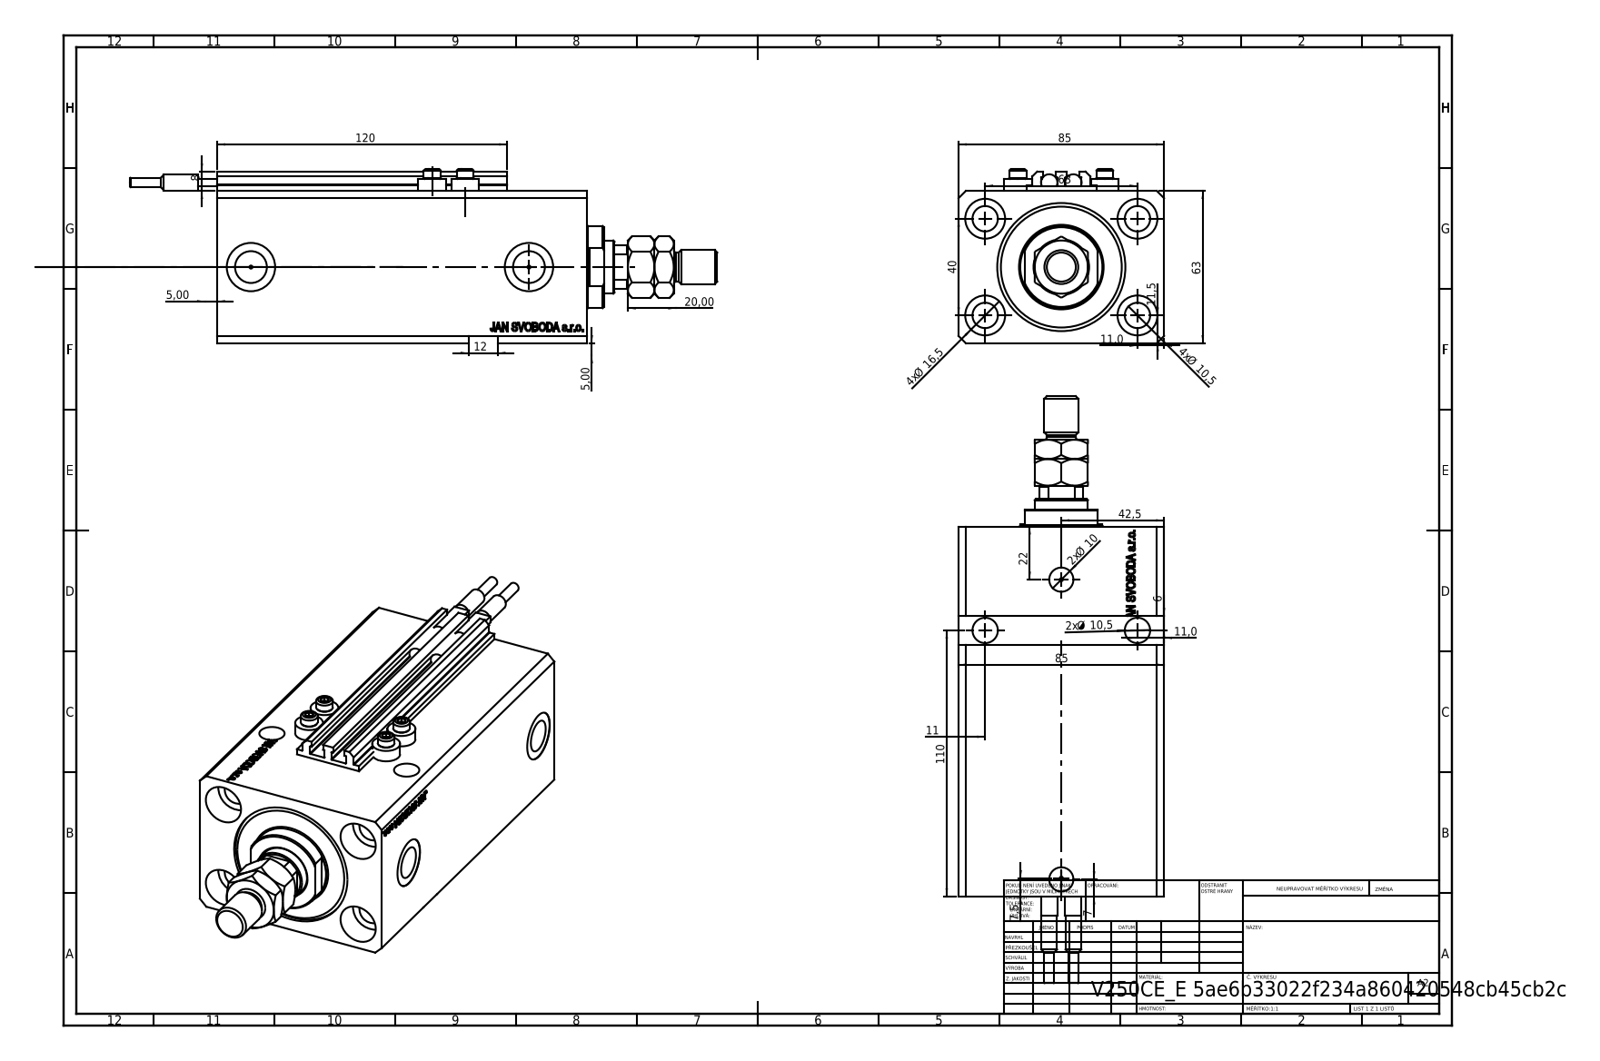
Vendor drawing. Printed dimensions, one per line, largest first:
120
110
85
85
63
63
42,5
40
22
20,00
4x Ø 16,5
12
11,5
11,0
11,0
11
4x Ø 10,5
2x Ø 10,5
2x Ø 10
8
7,5
7
6
5,00
5,00
